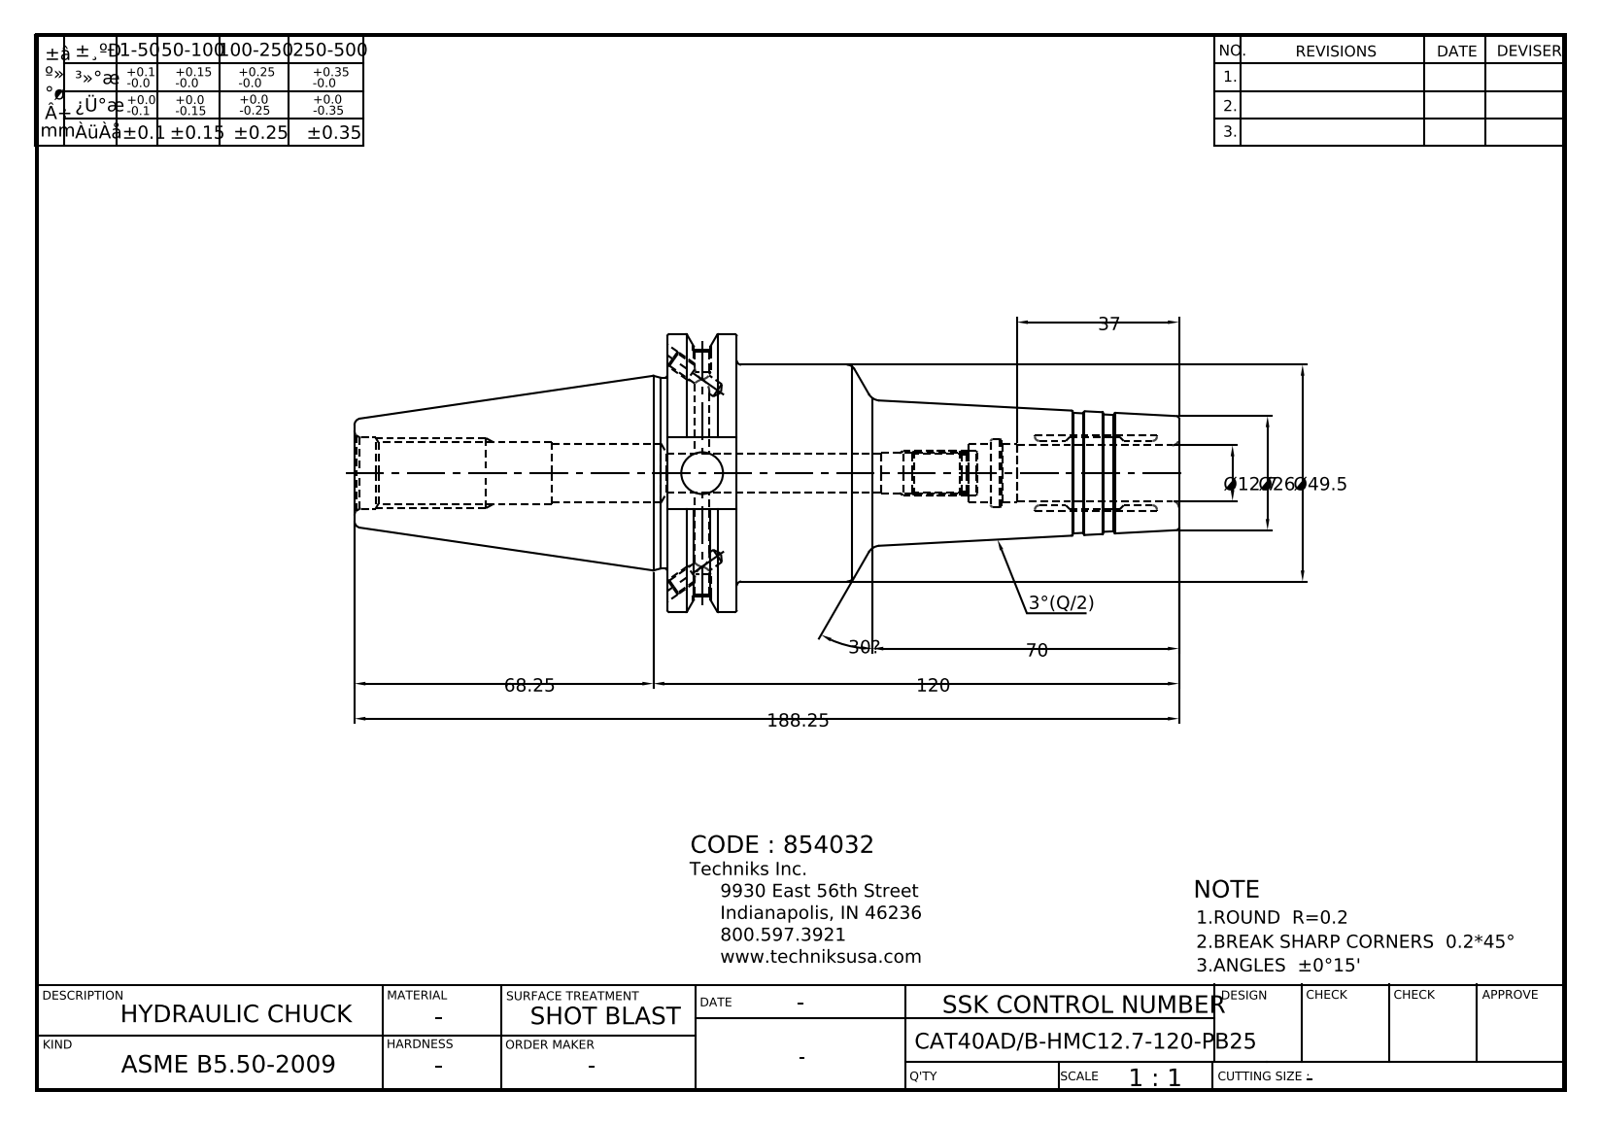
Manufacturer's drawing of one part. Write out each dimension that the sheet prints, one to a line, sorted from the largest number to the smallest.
188.25
120
70
68.25
Ø49.5
37
30?
Ø26
Ø12.7
